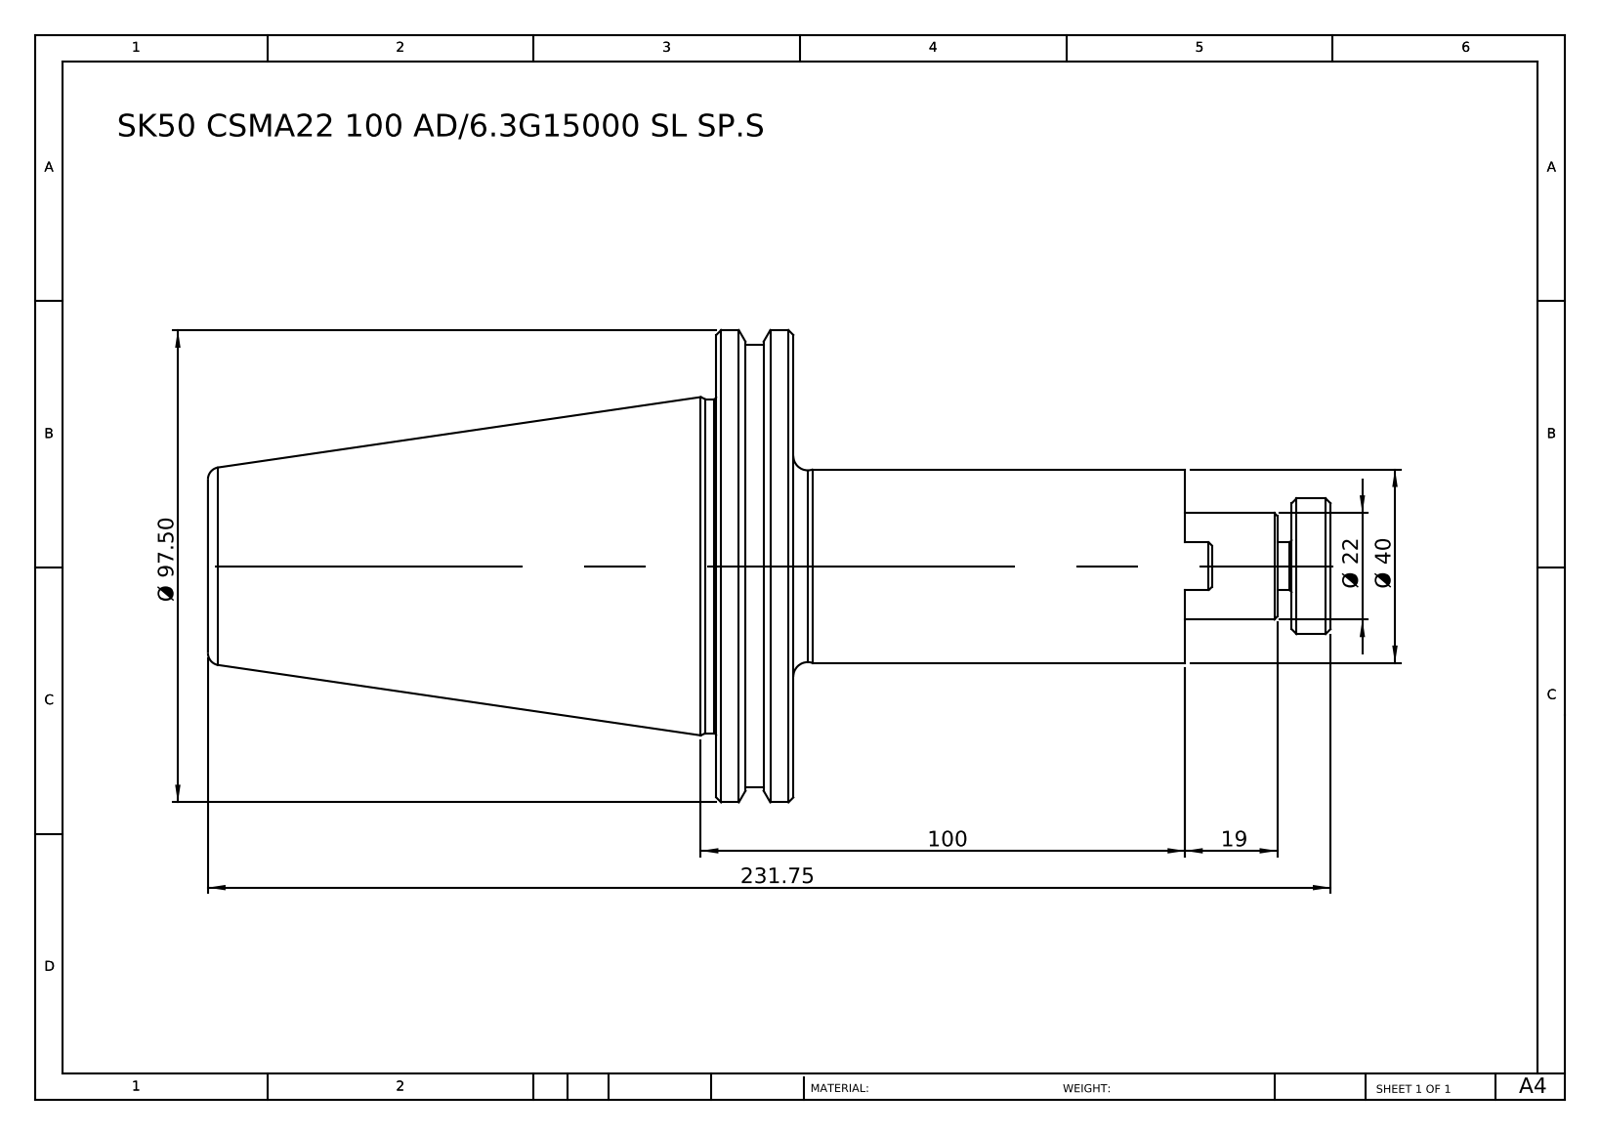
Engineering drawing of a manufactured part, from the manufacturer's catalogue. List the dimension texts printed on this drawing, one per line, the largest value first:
231.75
100
Ø 97.50
Ø 40
Ø 22
19
